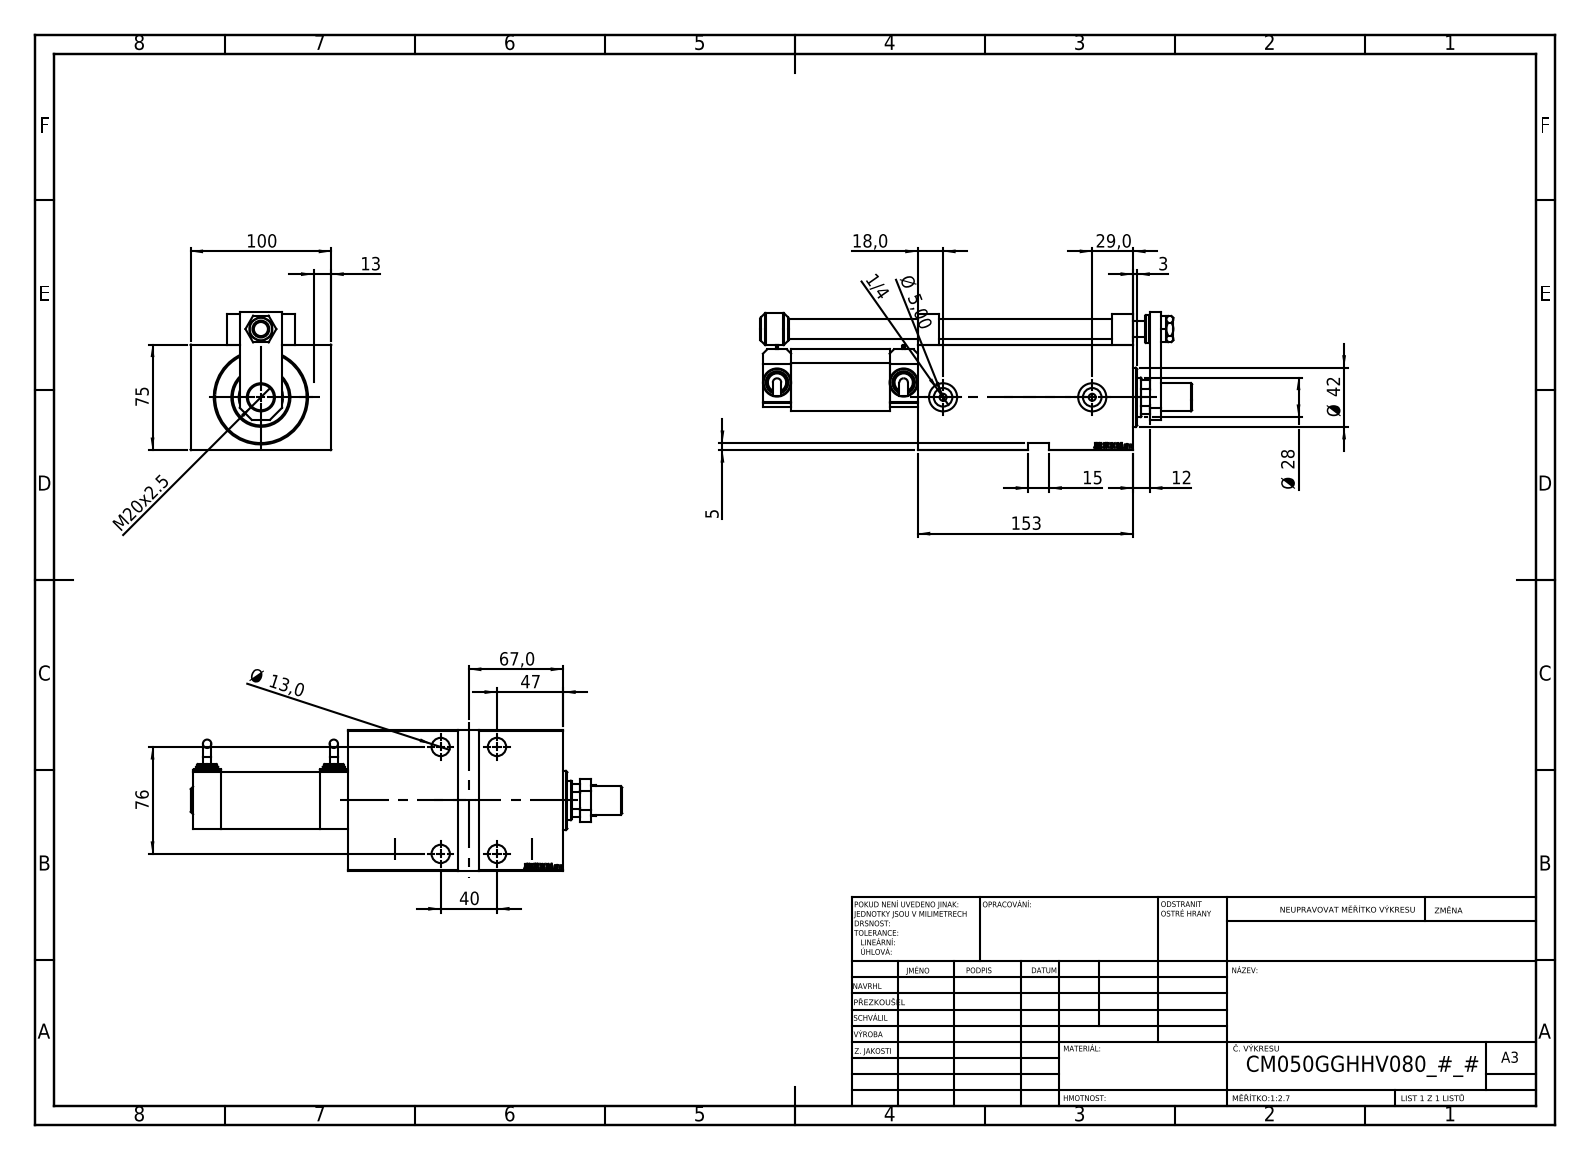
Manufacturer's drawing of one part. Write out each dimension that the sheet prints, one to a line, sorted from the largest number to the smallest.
153
100
76
75
67,0
47
Ø 42
40
29,0
Ø 28
M20x2.5
18,0
15
13
Ø 13,0
12
Ø 5,00
5
3
1/4
